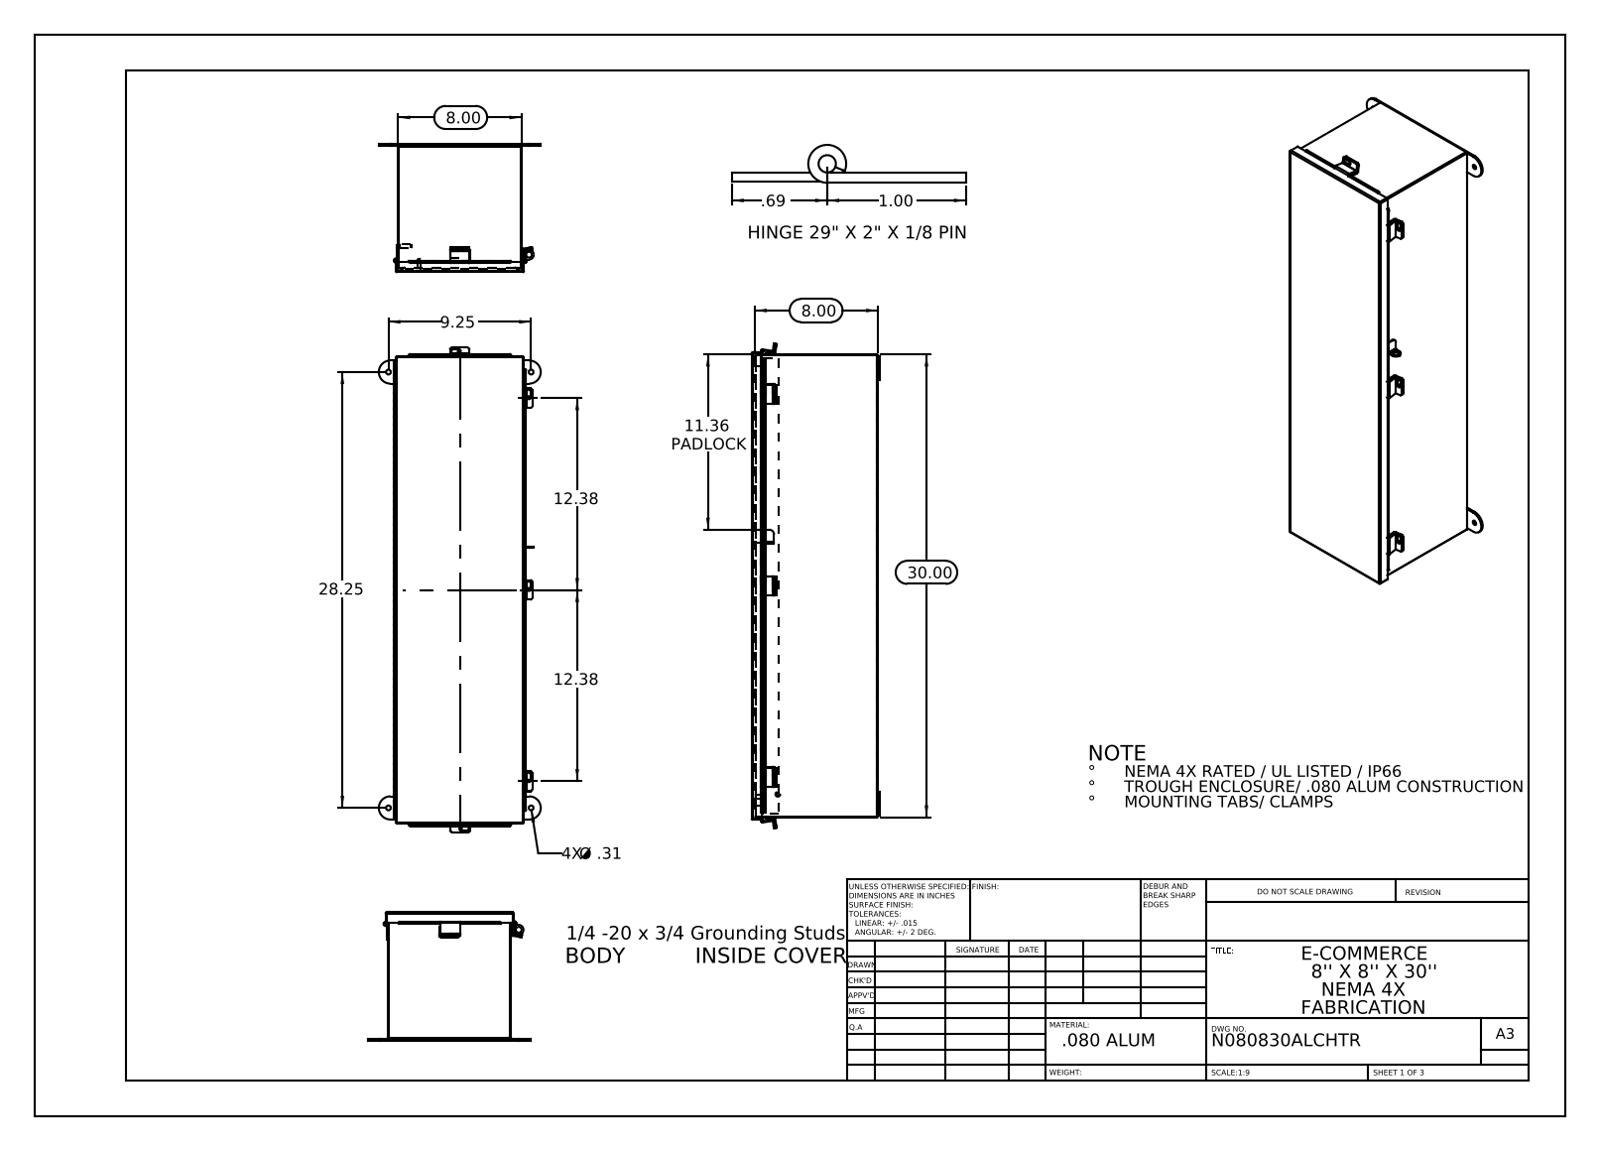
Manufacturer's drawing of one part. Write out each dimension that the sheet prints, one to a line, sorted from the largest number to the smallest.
30.00
28.25
12.38
12.38
11.36 PADLOCK
9.25
8.00
8.00
1.00
.69
4X Ø .31
